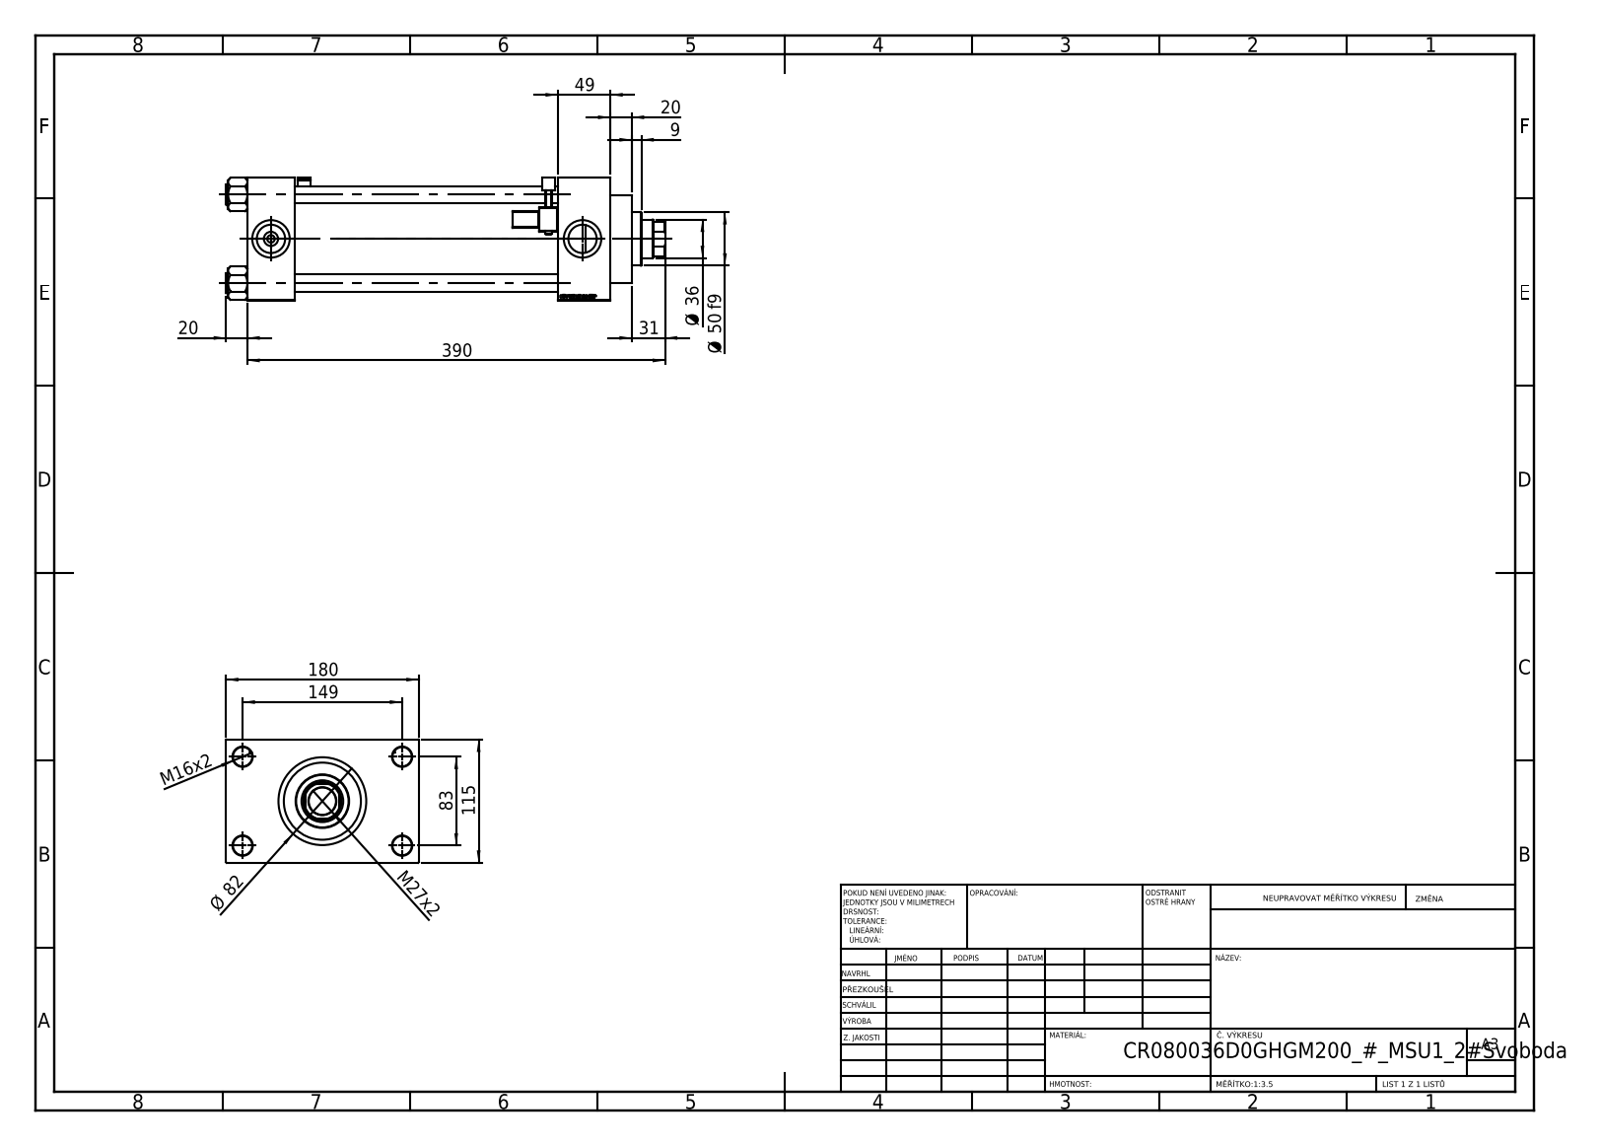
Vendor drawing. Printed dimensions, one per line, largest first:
390
180
149
115
83
Ø 82
Ø 50 f9
49
Ø 36
31
M27x2
20
20
M16x2
9
